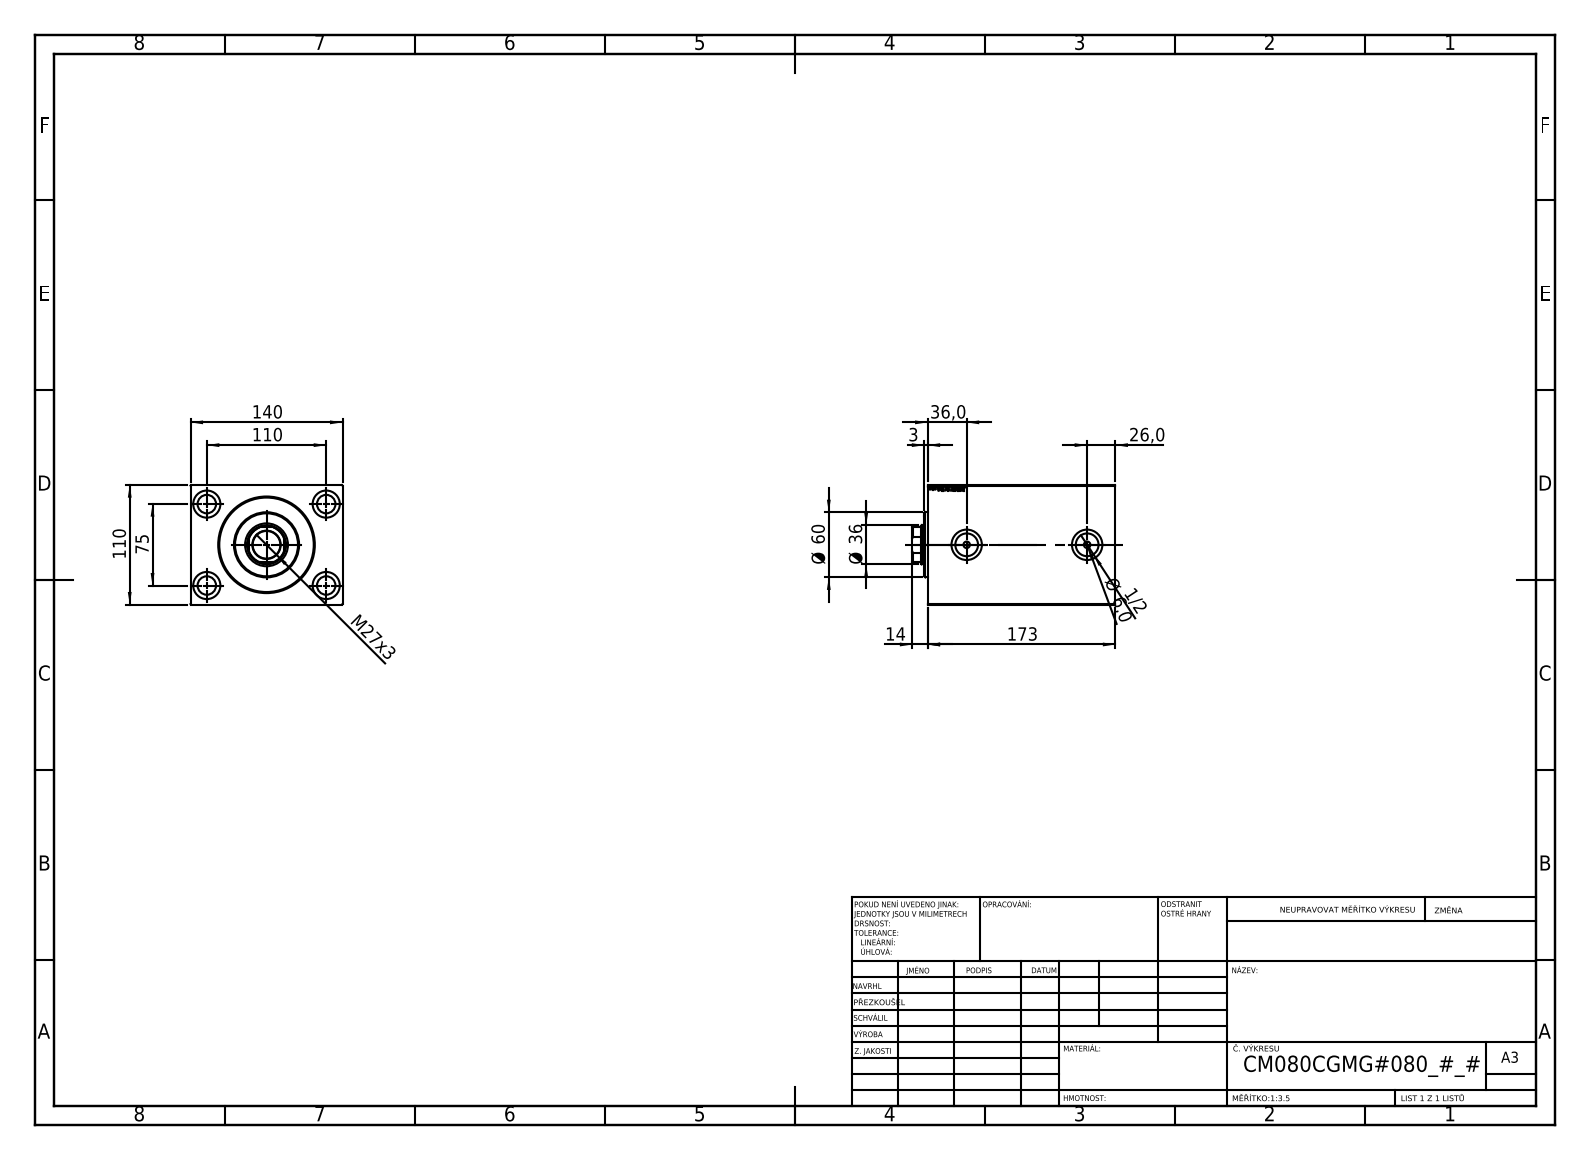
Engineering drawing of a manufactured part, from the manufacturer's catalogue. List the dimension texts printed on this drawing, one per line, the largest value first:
173
140
110
110
75
Ø 60
Ø 36
36,0
M27x3
26,0
14
Ø 6,0
3
1/2
